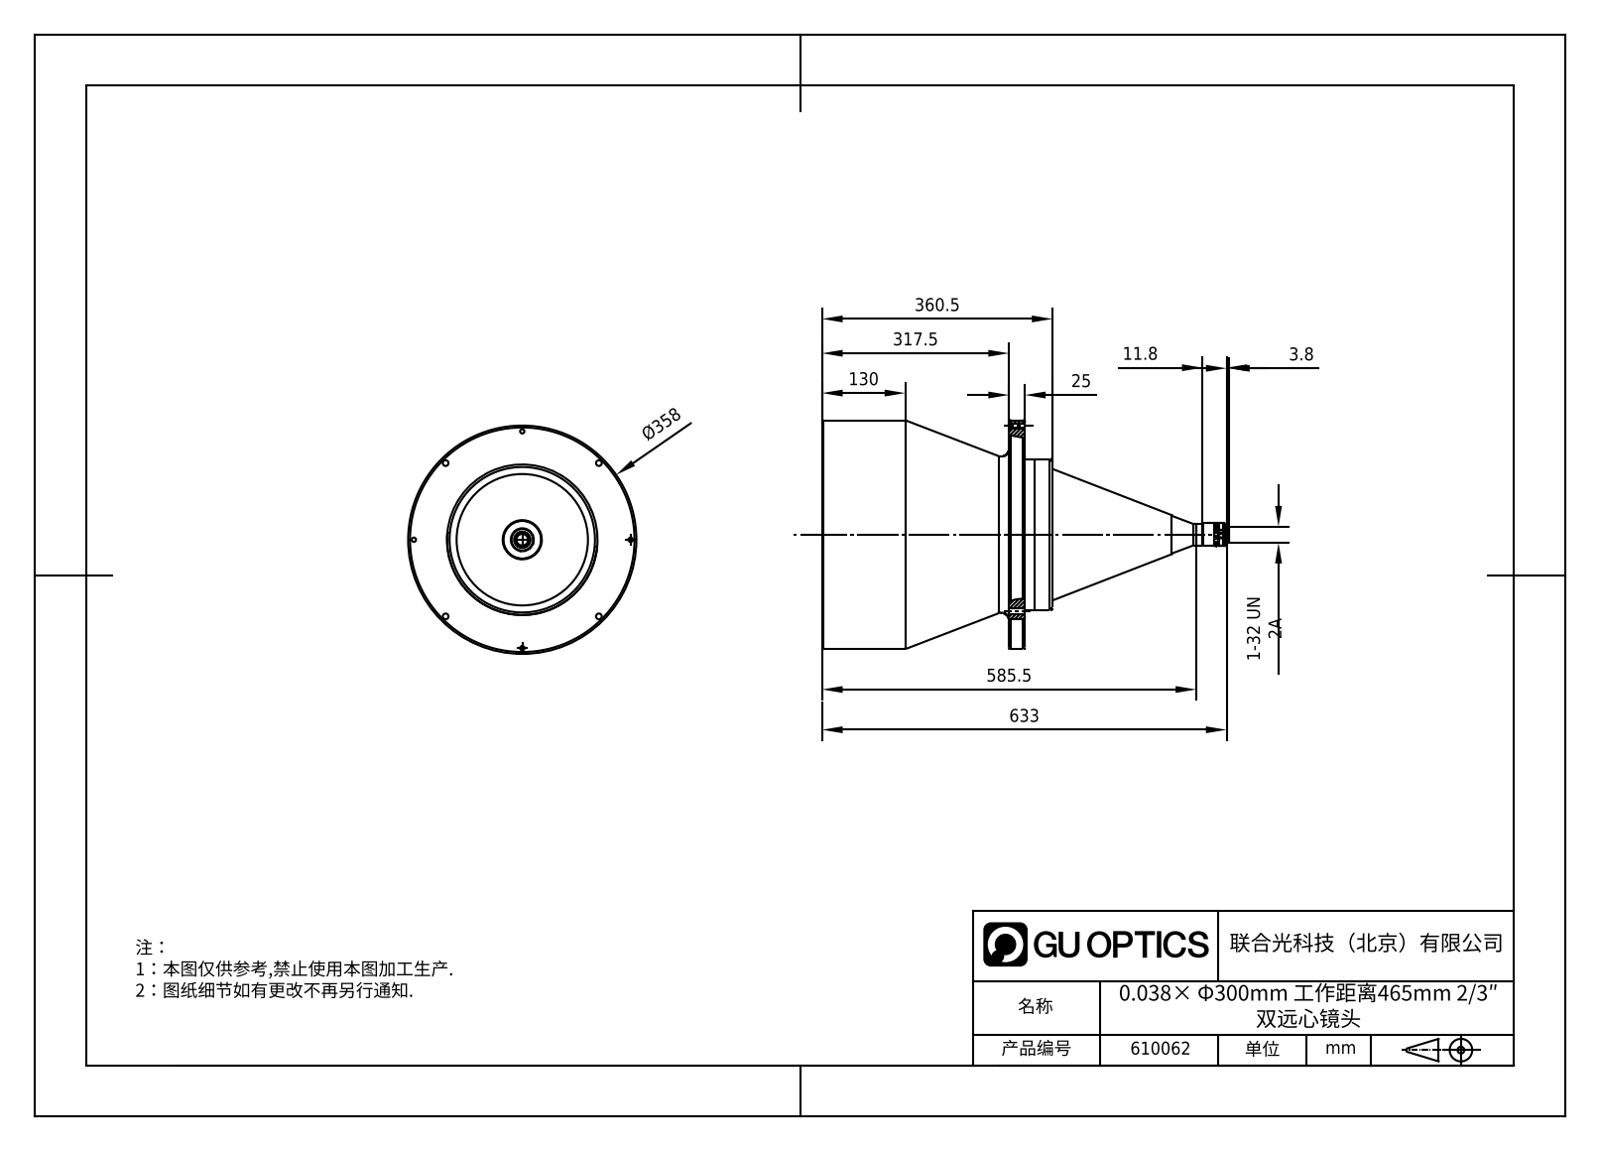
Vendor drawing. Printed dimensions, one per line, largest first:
633
585.5
360.5
Ø358
317.5
130
25
11.8
3.8
1-32 UN 2A
